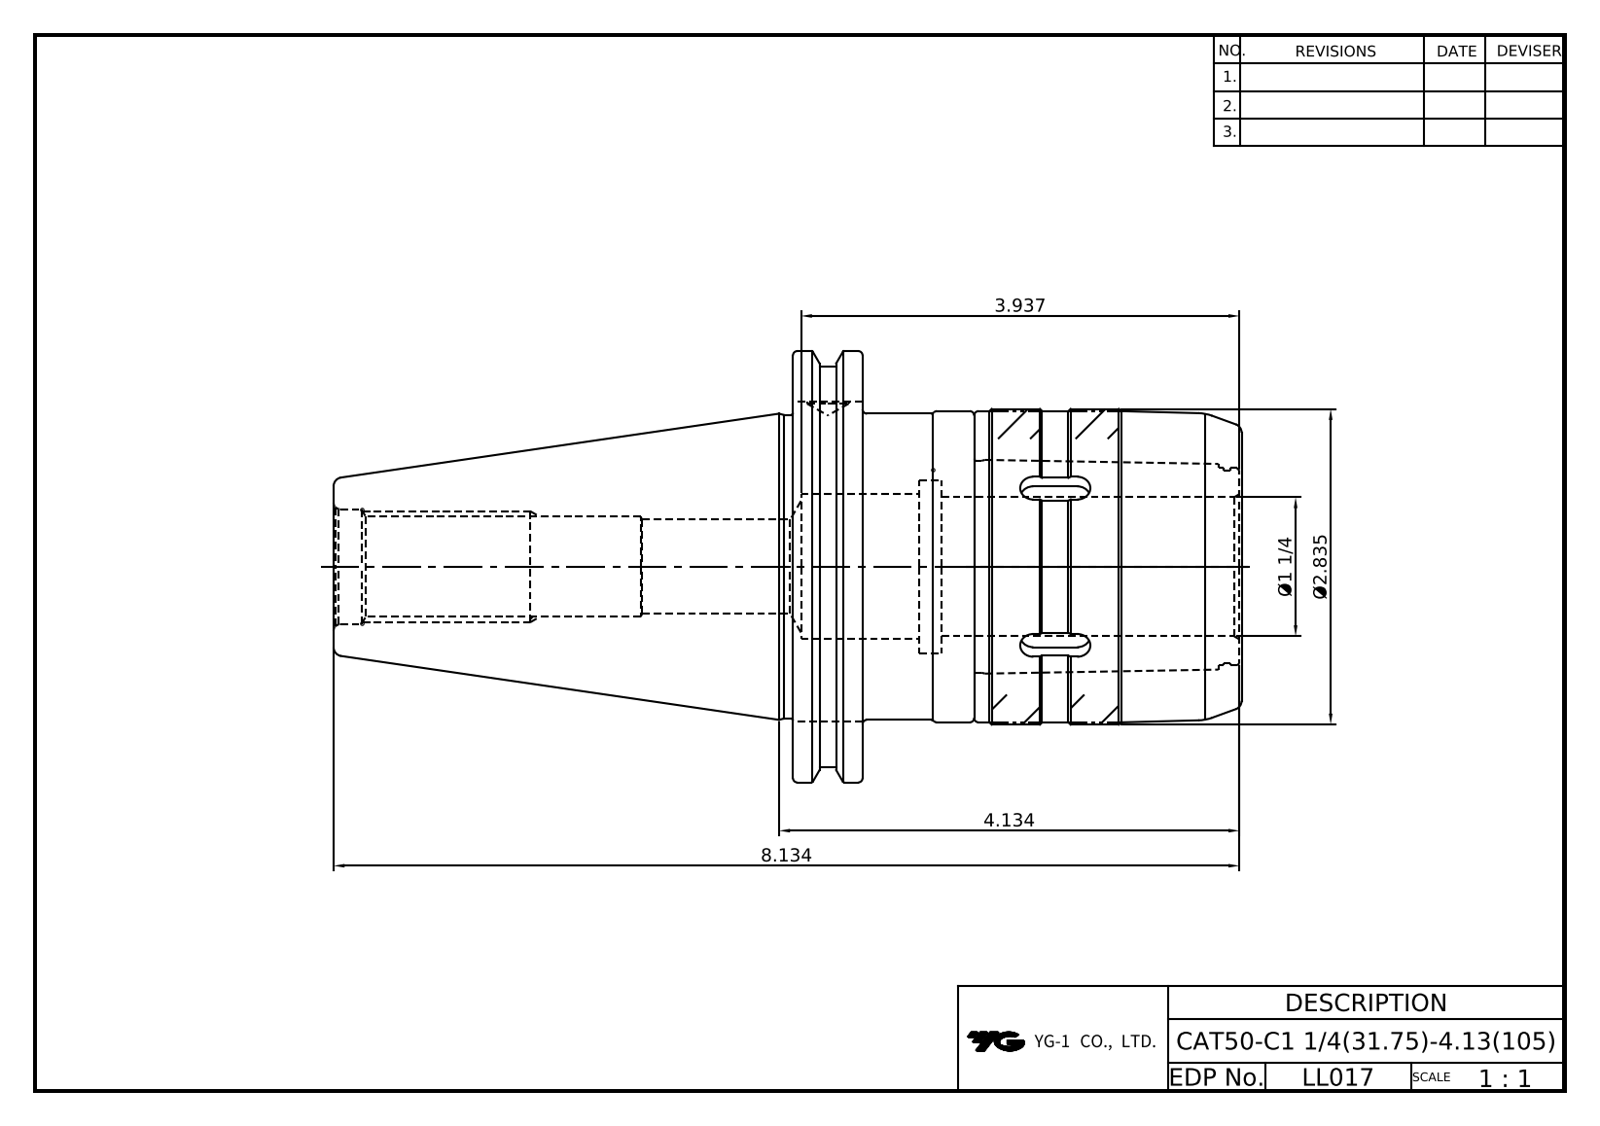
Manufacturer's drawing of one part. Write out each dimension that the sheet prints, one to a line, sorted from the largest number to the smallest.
8.134
4.134
3.937
Ø2.835
Ø1 1/4
